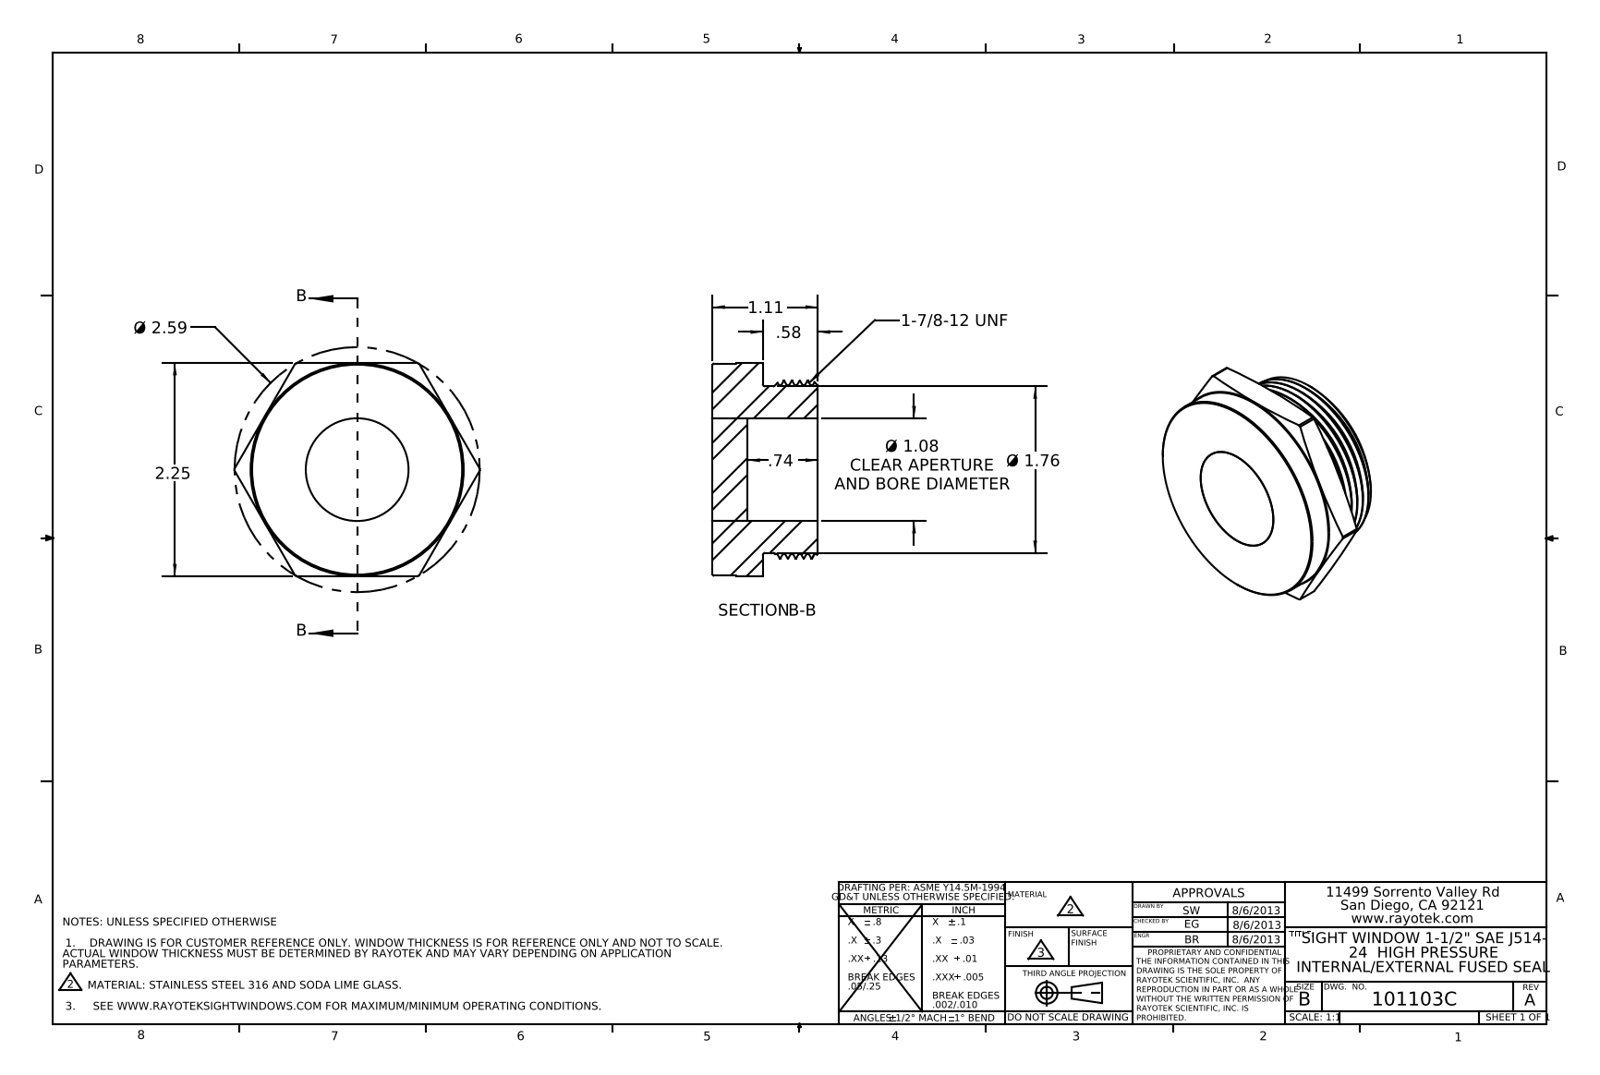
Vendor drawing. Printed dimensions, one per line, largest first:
Ø 2.59
2.25
Ø 1.76
1.11
Ø 1.08 CLEAR APERTURE AND BORE DIAMETER
.74
.58
